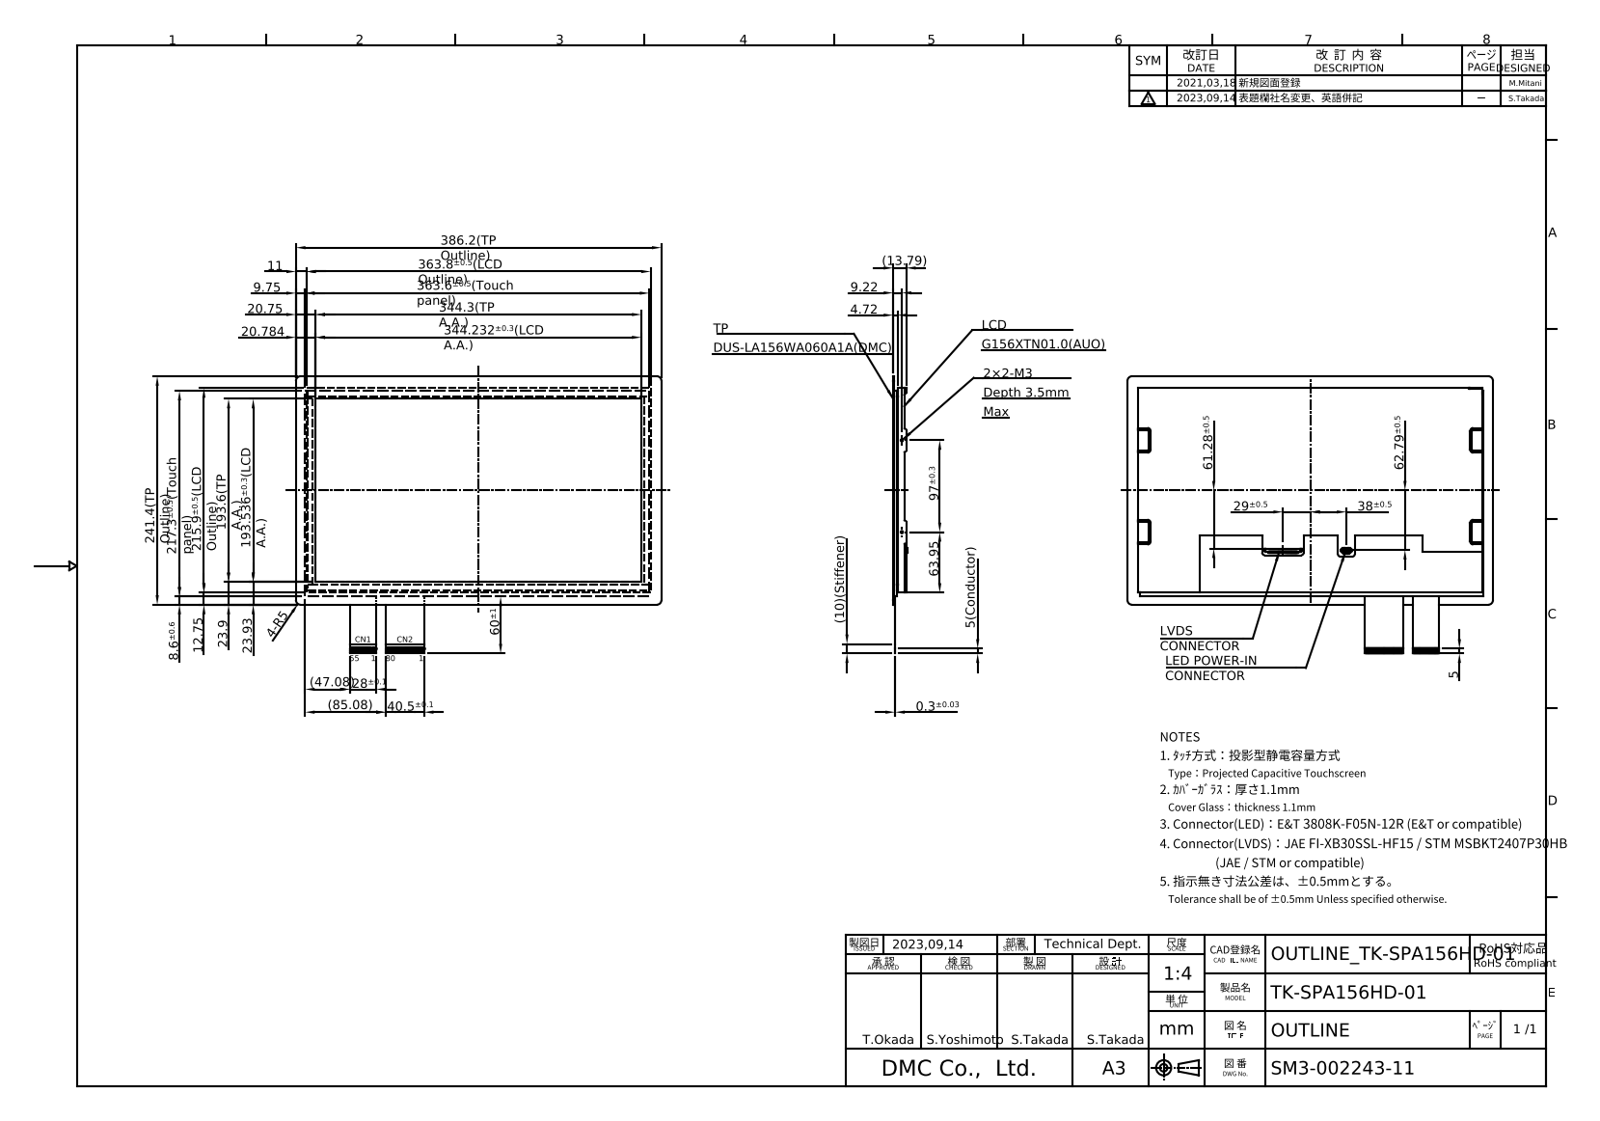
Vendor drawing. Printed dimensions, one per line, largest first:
386.2(TP Outline)
363.8±0.5(LCD Outline)
363.6±0.5(Touch panel)
344.3(TP A.A.)
344.232±0.3(LCD A.A.)
241.4(TP Outline)
217.3±0.5(Touch panel)
215.9±0.5(LCD Outline)
193.6(TP A.A.)
193.536±0.3(LCD A.A.)
97±0.3
(85.08)
63.95
62.79±0.5
61.28±0.5
60±1
(47.08)
40.5±0.1
38±0.5
29±0.5
28±0.1
23.93
23.9
20.784
20.75
(13.79)
12.75
11
(10)(Stiffener)
9.75
9.22
8.6±0.6
4-R5
5
5(Conductor)
4.72
0.3±0.03
